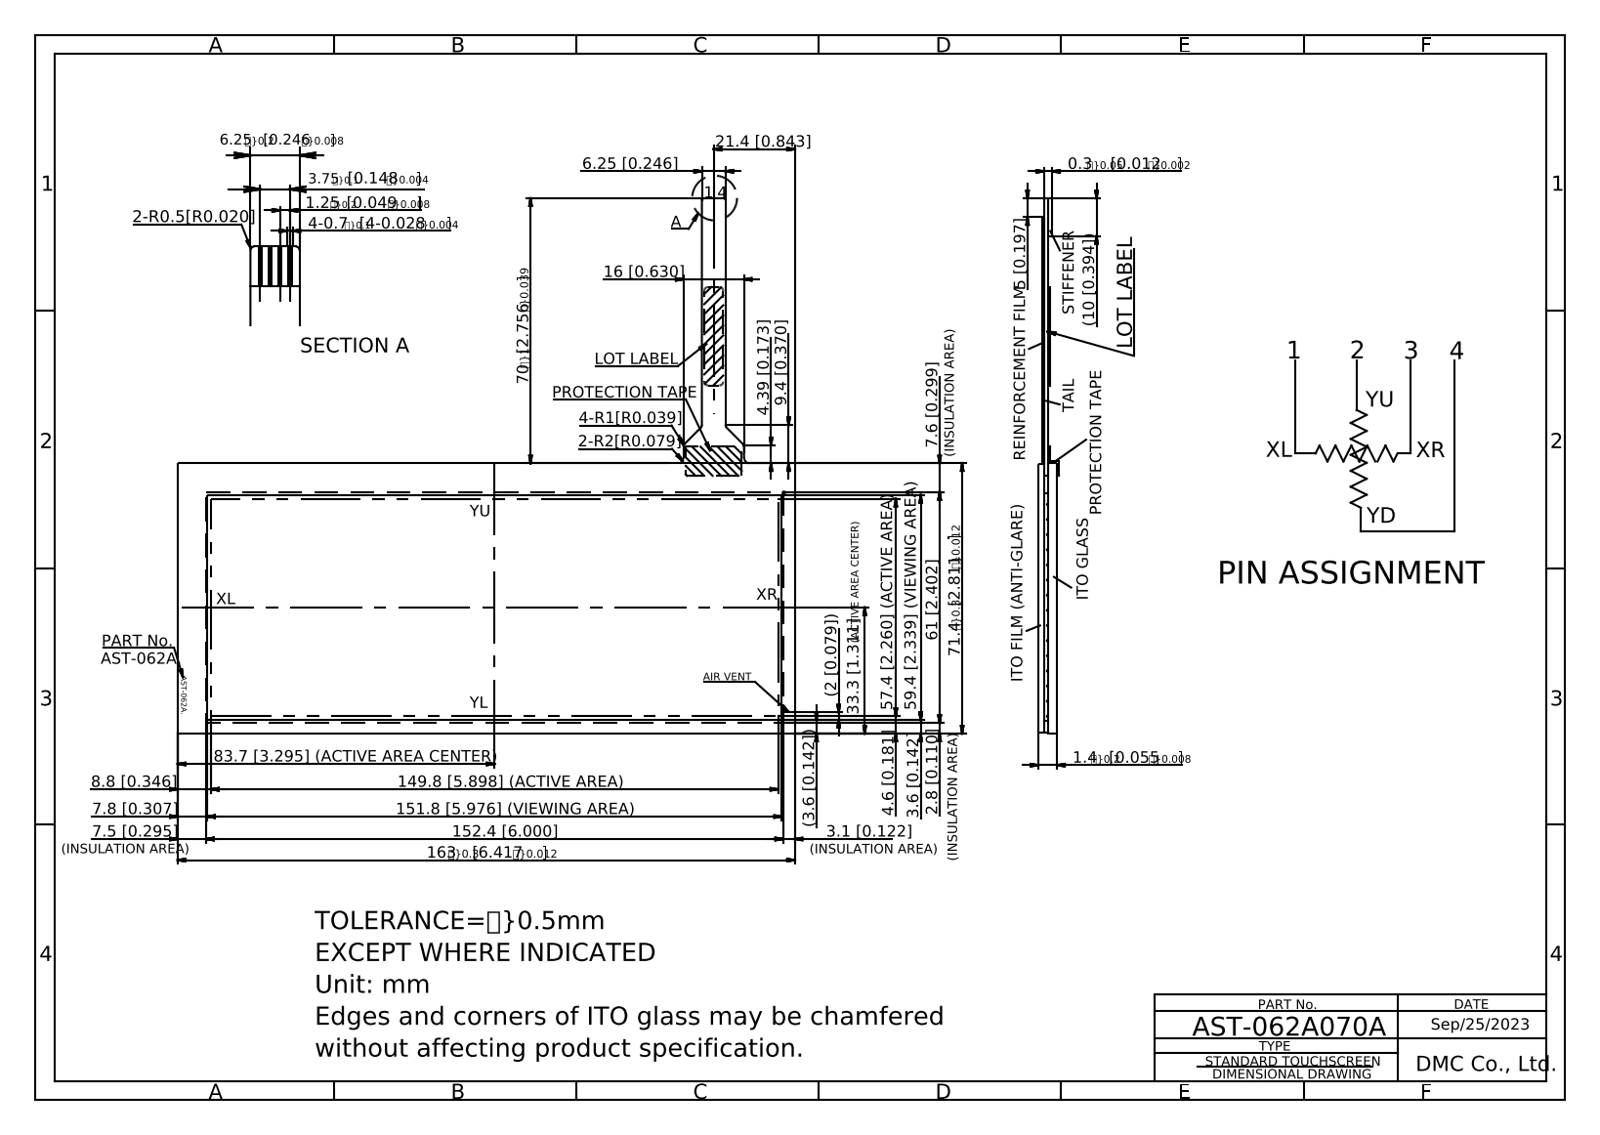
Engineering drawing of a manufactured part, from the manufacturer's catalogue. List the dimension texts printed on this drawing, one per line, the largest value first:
163.00
152.4 [6.000]
151.8 [5.976] (VIEWING AREA)
149.8 [5.898] (ACTIVE AREA)
83.7 [3.295] (ACTIVE AREA CENTER)
71.40
70.00
61 [2.402]
59.4 [2.339] (VIEWING AREA)
57.4 [2.260] (ACTIVE AREA)
33.30{\H0.6667x;(ACTIVE AREA CENTER)}
21.4 [0.843]
16 [0.630]
(10 [0.394])
9.4 [0.370]
8.8 [0.346]
7.8 [0.307]
7.6 [0.299]
7.5 [0.295]
6.25 [0.246]
5 [0.197]
4.6 [0.181]
4.39 [0.173]
4-0.7{\H0.6x;?}0.1}[4-0.028{\H0.66667x;?}0.004}]
3.6 [0.142]
(3.6 [0.142])
3.1 [0.122]
2.8 [0.110]
(2 [0.079])
1.4{\H0.6667x;?}0.2}[0.055{\H0.66667x;?}0.008}]
1.25{\H0.6x;?}0.2}[0.049{\H0.66667x;?}0.008}]
0.3{\H0.6667x;?}0.05}[0.012{\H0.66667x;?}0.002}]
